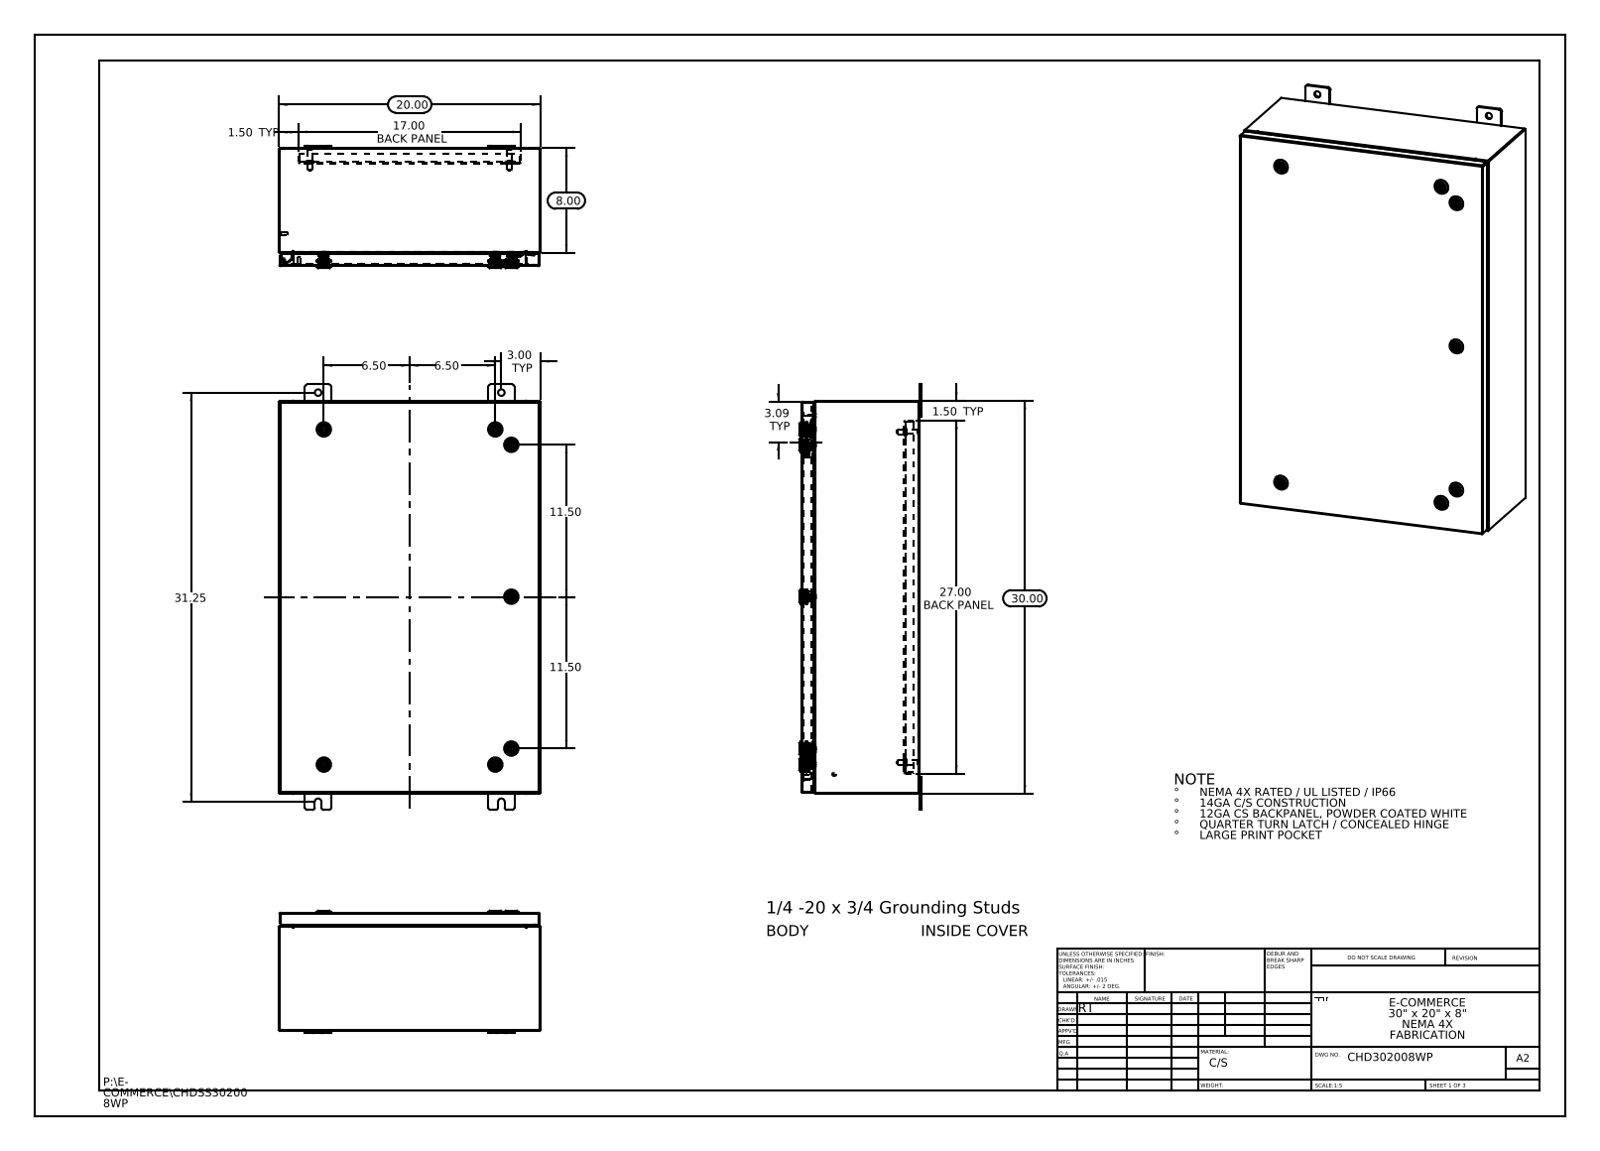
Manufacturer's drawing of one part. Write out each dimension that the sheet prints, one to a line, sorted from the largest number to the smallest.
31.25
30.00
27.00 BACK PANEL
20.00
17.00 BACK PANEL
11.50
11.50
8.00
6.50
6.50
3.09 TYP
3.00 TYP
1.50 TYP
1.50 TYP
